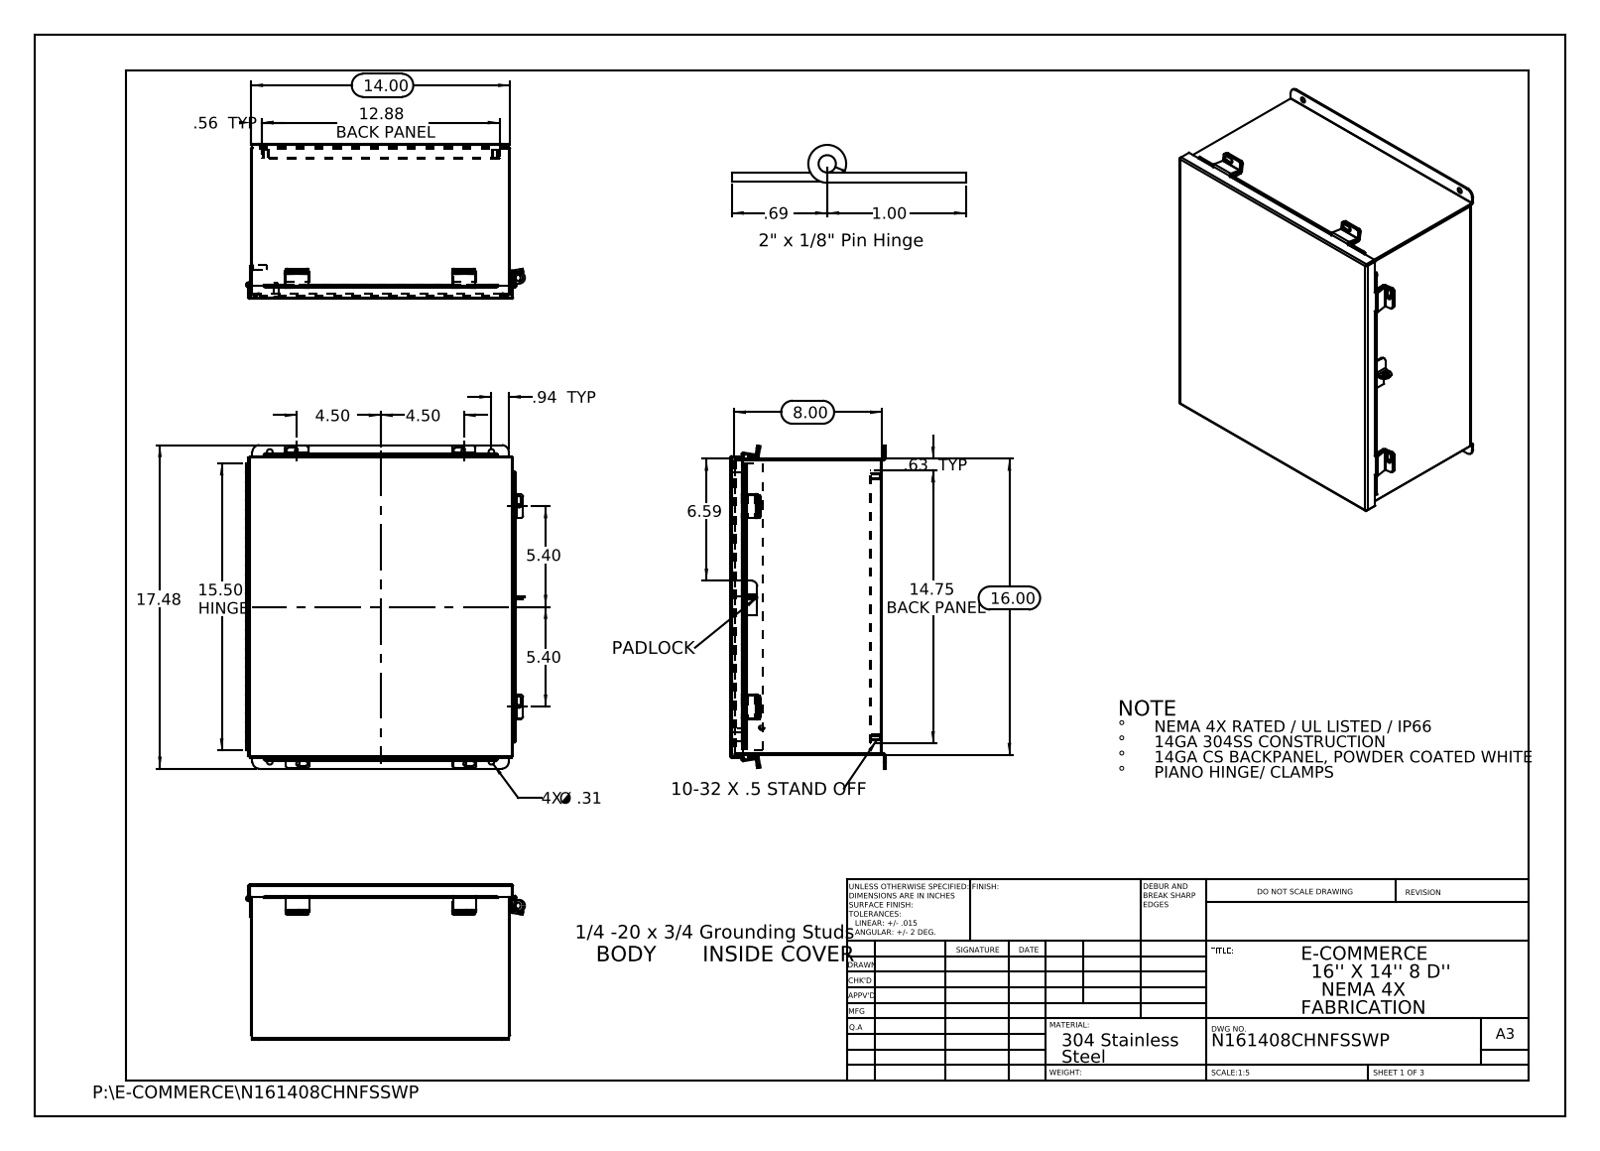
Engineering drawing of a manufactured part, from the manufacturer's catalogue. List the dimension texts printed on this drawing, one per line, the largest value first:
17.48
16.00
15.50 HINGE
14.75 BACK PANEL
14.00
12.88 BACK PANEL
8.00
6.59
5.40
5.40
4.50
4.50
1.00
.94 TYP
.69
.63 TYP
.56 TYP
4X Ø .31
